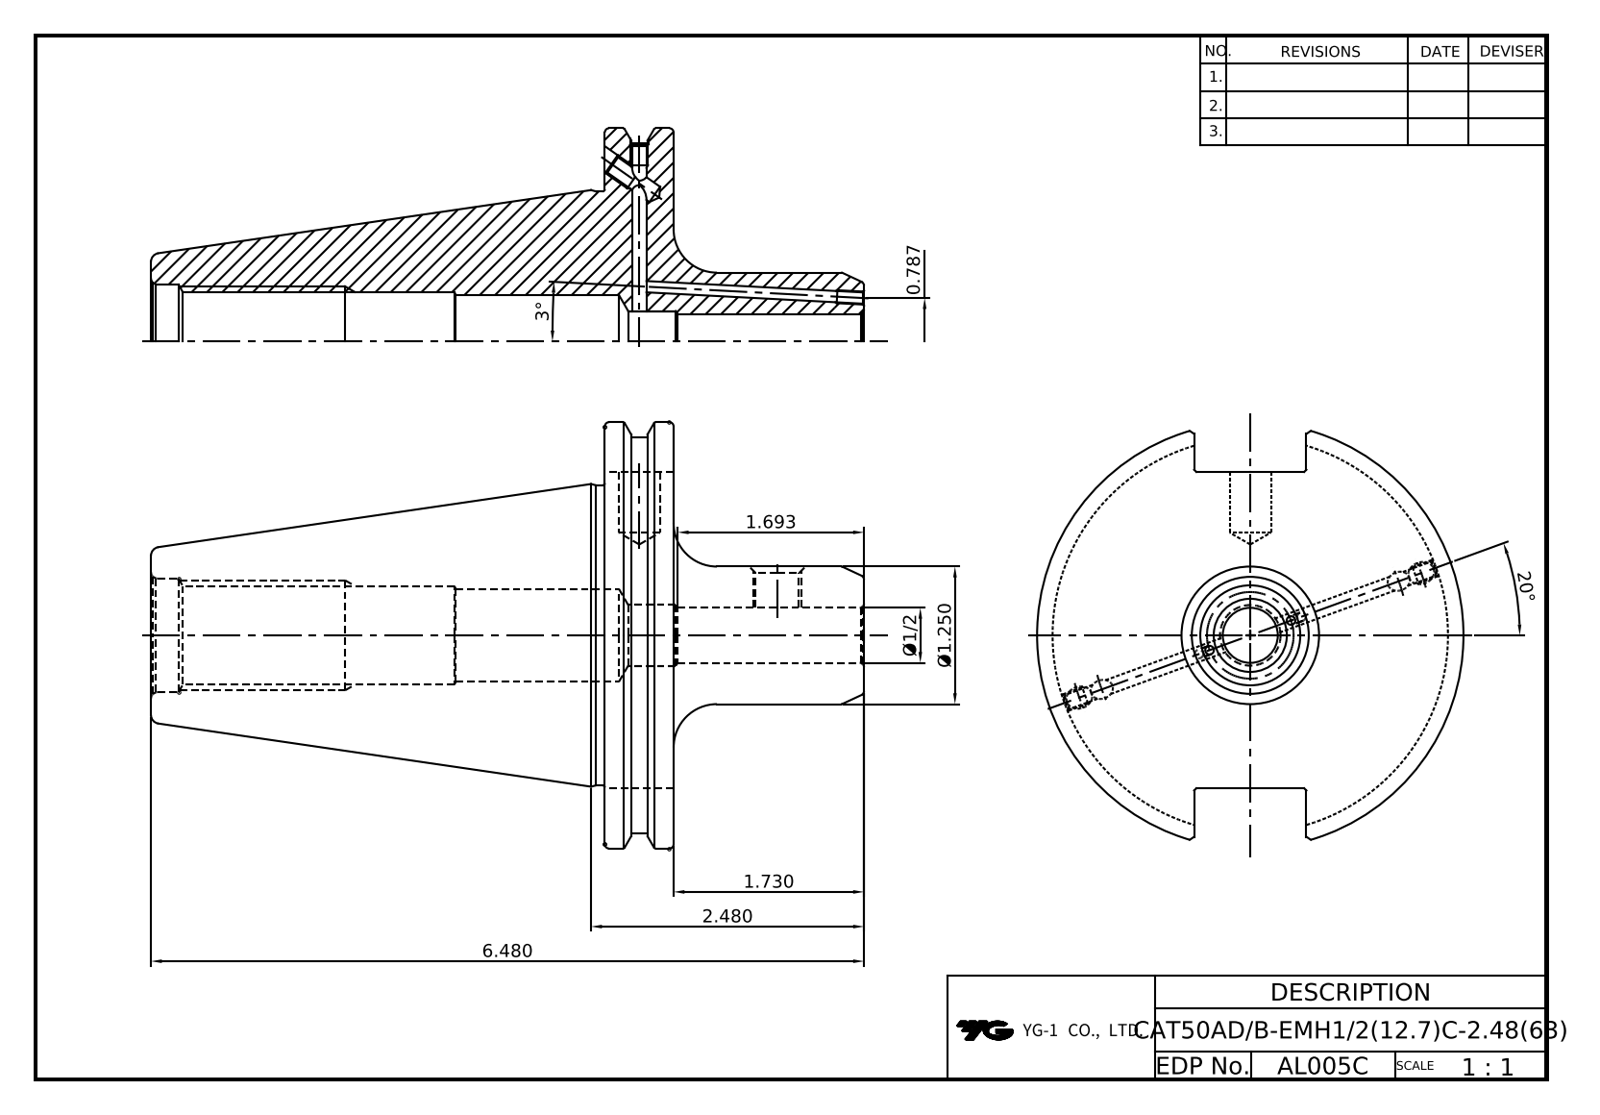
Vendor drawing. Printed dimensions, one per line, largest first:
20°
6.480
3°
2.480
1.730
1.693
Ø1.250
Ø1/2
